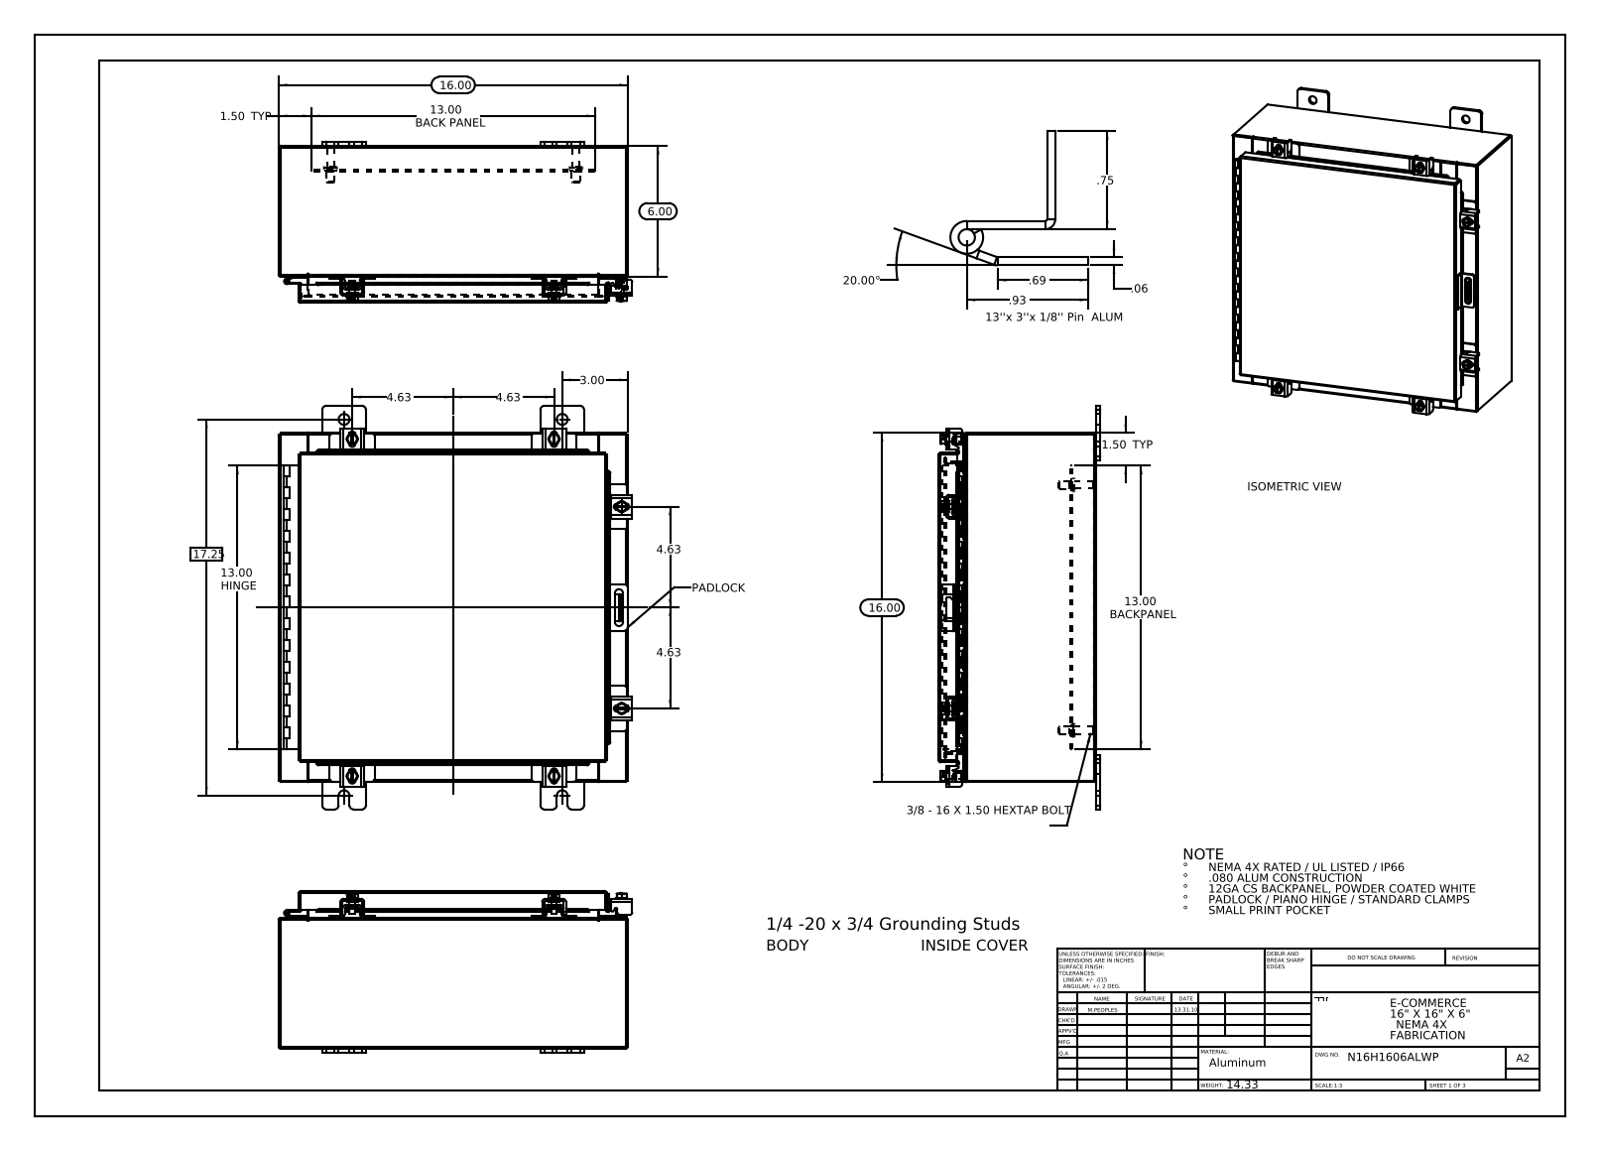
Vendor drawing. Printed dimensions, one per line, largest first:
20.00°
17.25
16.00
16.00
13.00 HINGE
13.00 BACK PANEL
13.00 BACKPANEL
6.00
4.63
4.63
4.63
4.63
3.00
1.50 TYP
1.50 TYP
.93
.75
.69
.06
